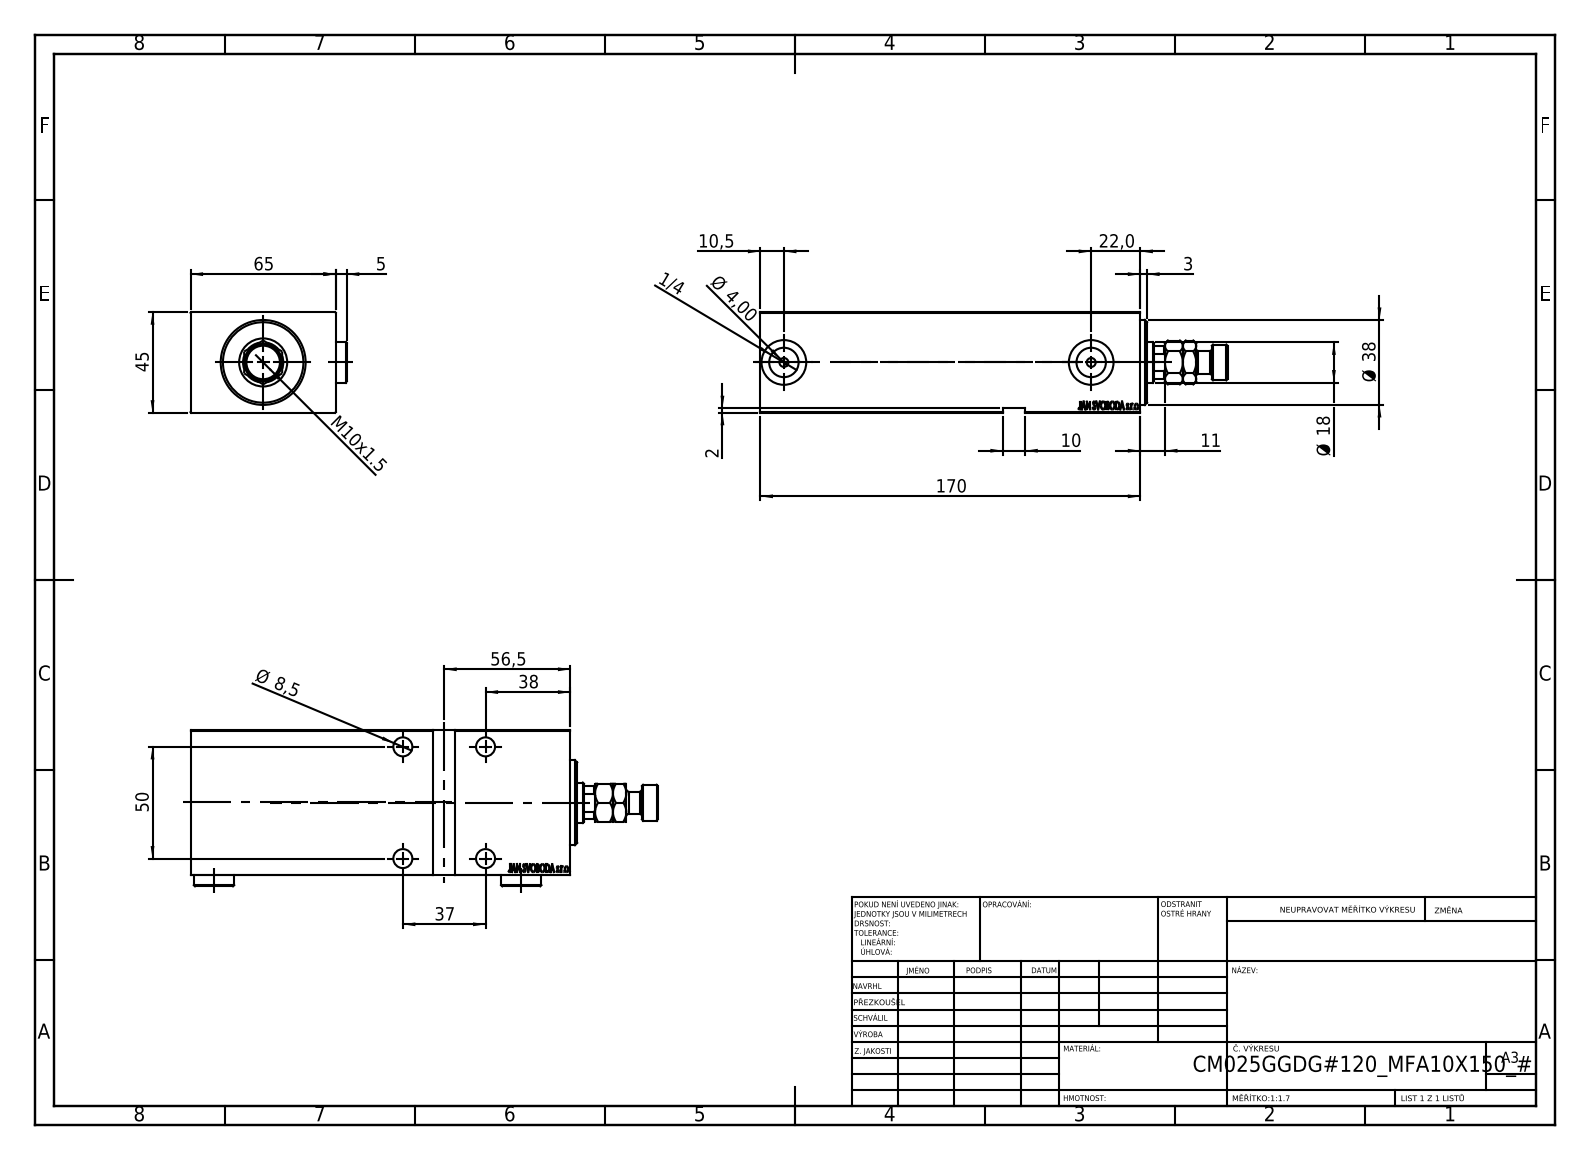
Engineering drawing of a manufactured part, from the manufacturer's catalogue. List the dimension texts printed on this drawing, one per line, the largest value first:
170
65
56,5
50
45
Ø 38
38
37
22,0
Ø 18
11
10,5
M10x1.5
10
Ø 8,5
5
Ø 4,00
3
2
1/4
